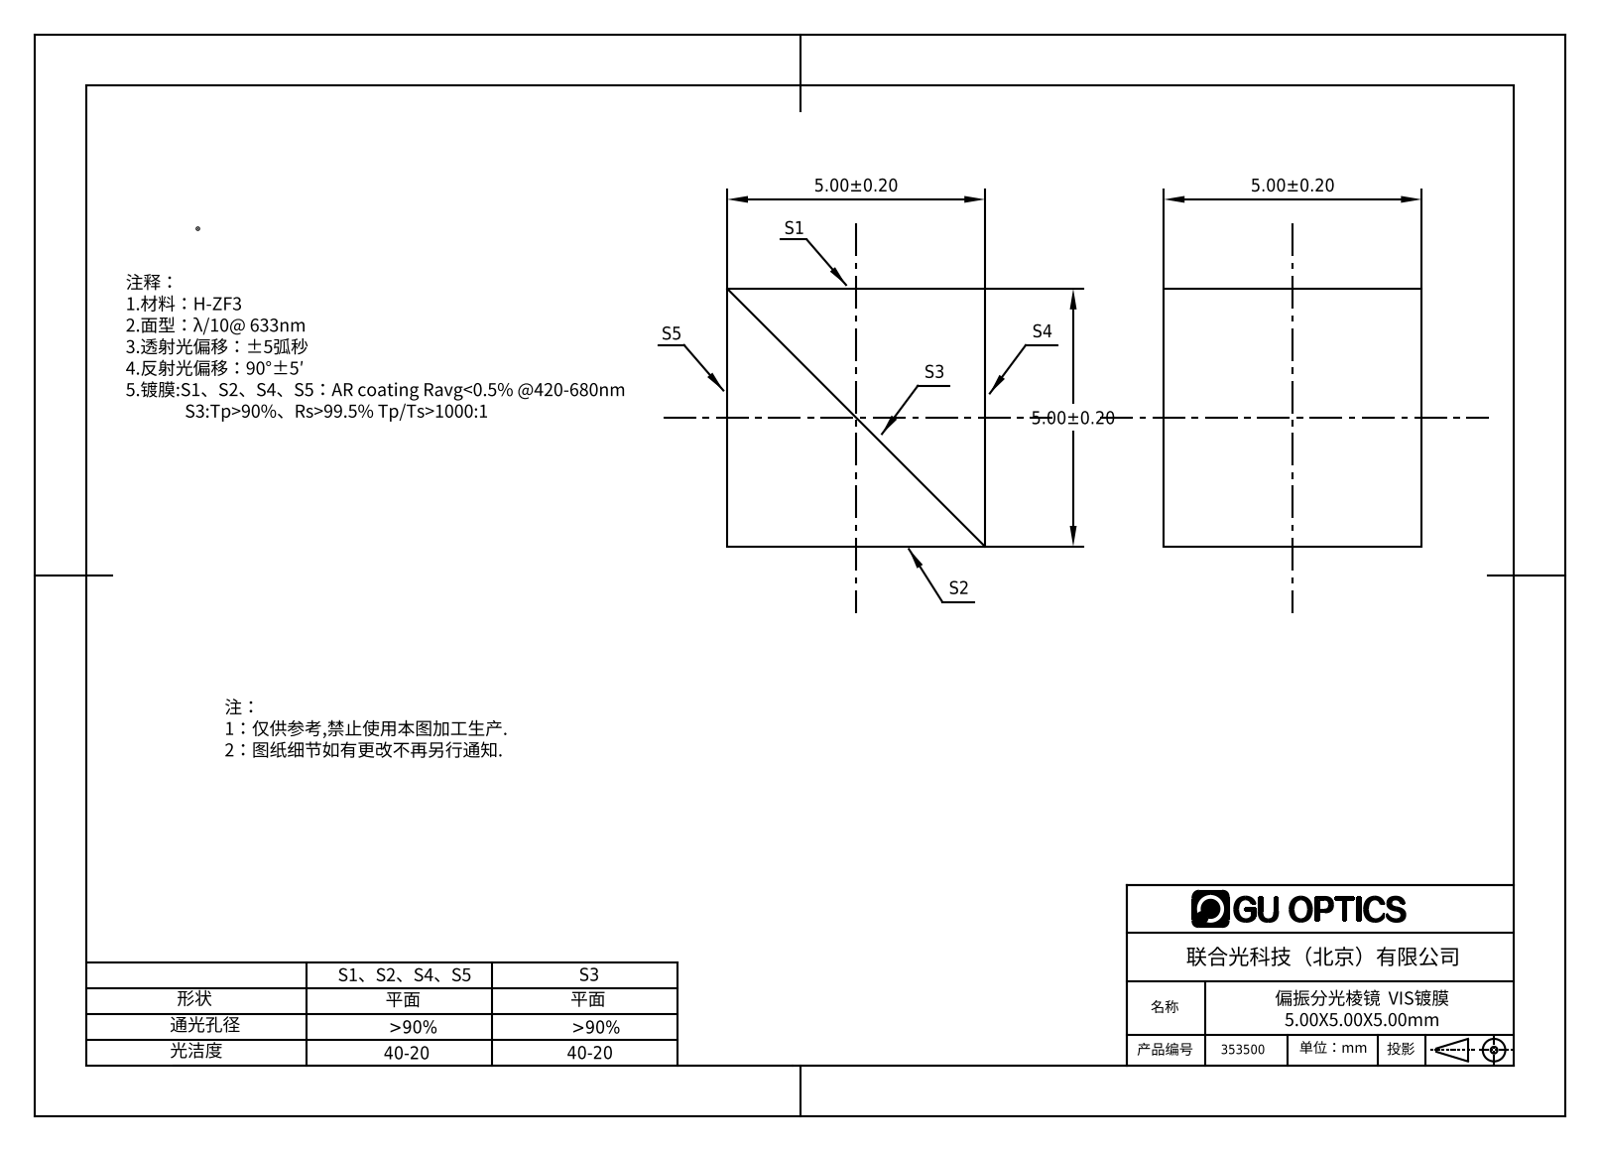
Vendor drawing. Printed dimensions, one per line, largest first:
5.00±0.20
5.00±0.20
5.00±0.20
